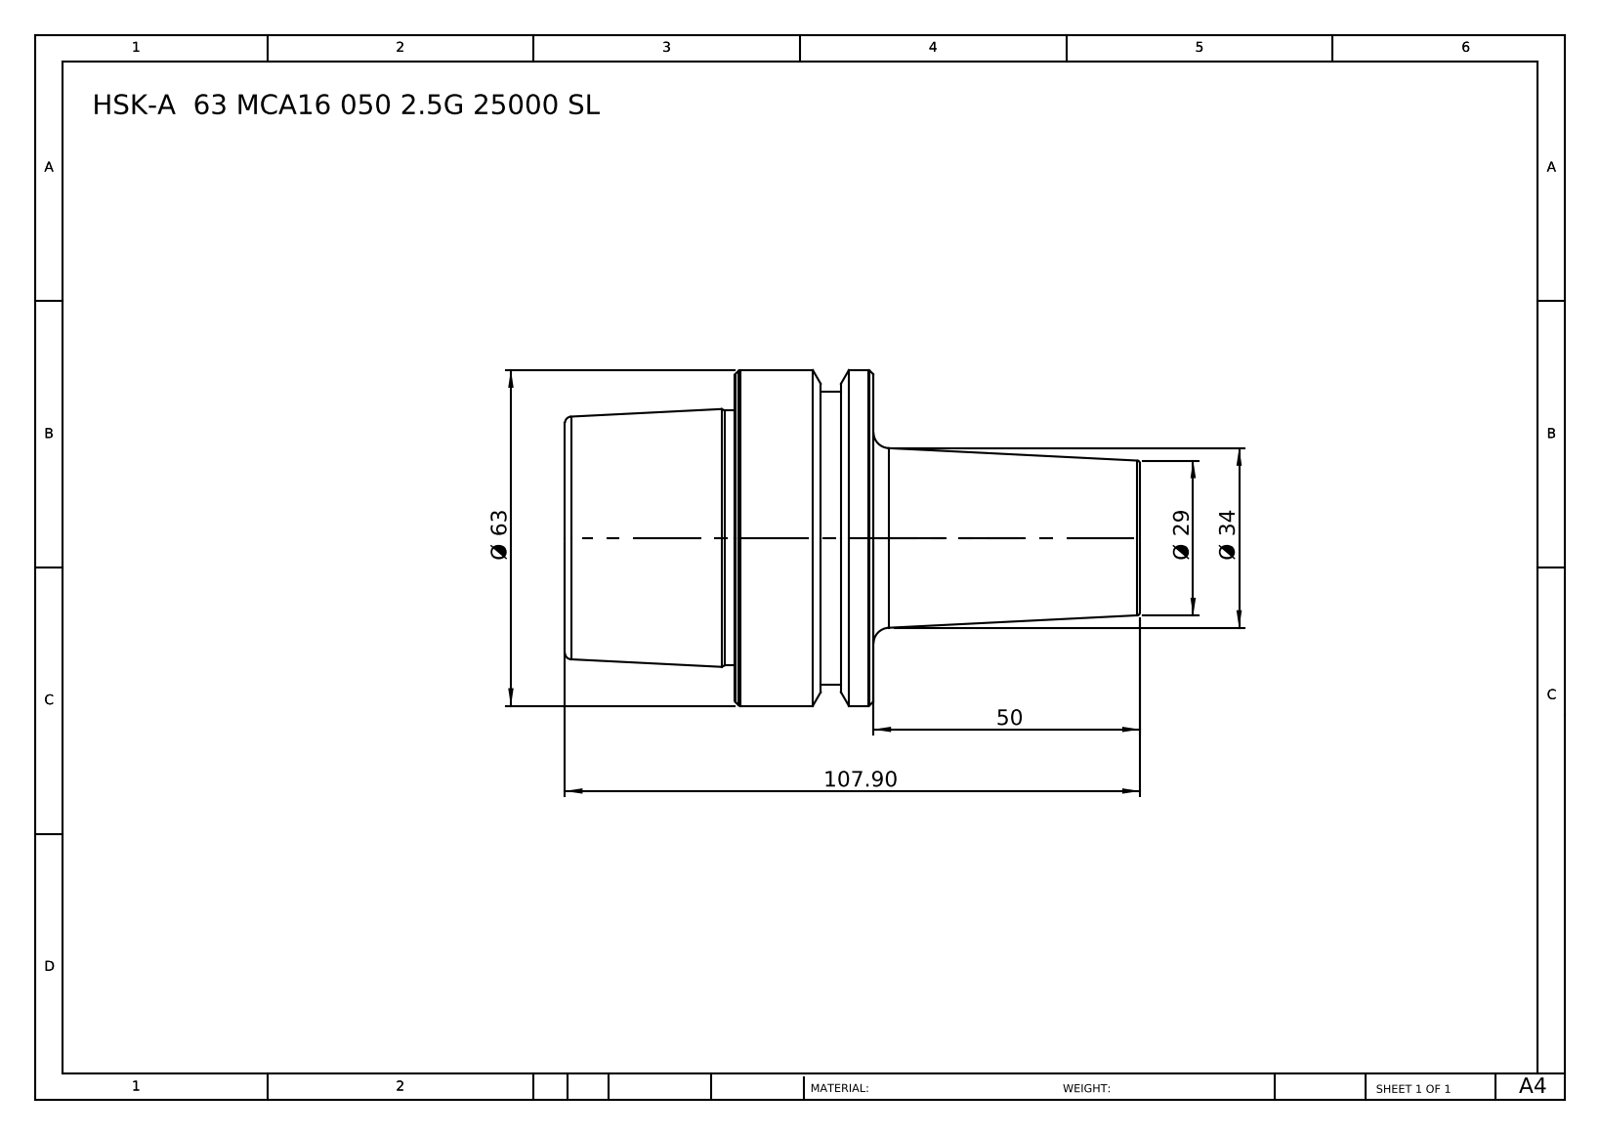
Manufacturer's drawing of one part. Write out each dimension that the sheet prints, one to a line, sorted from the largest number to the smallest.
107.90
Ø 63
50
Ø 34
Ø 29
